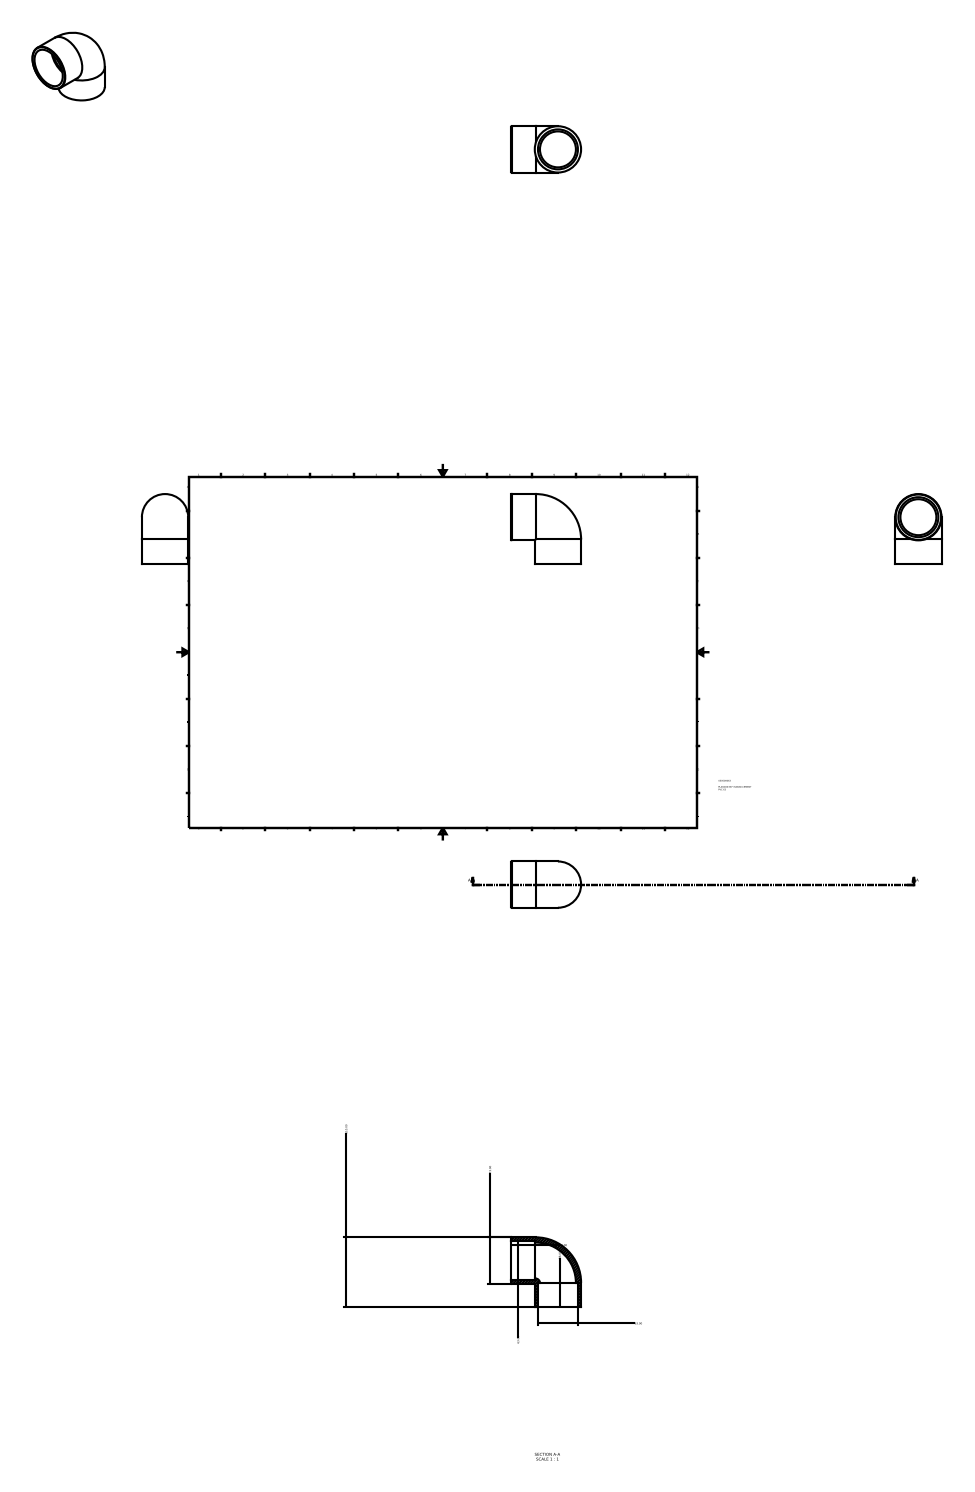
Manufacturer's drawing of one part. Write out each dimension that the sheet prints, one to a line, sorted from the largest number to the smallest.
110.00
73.00
63.00
63.00
38.00
38.00
